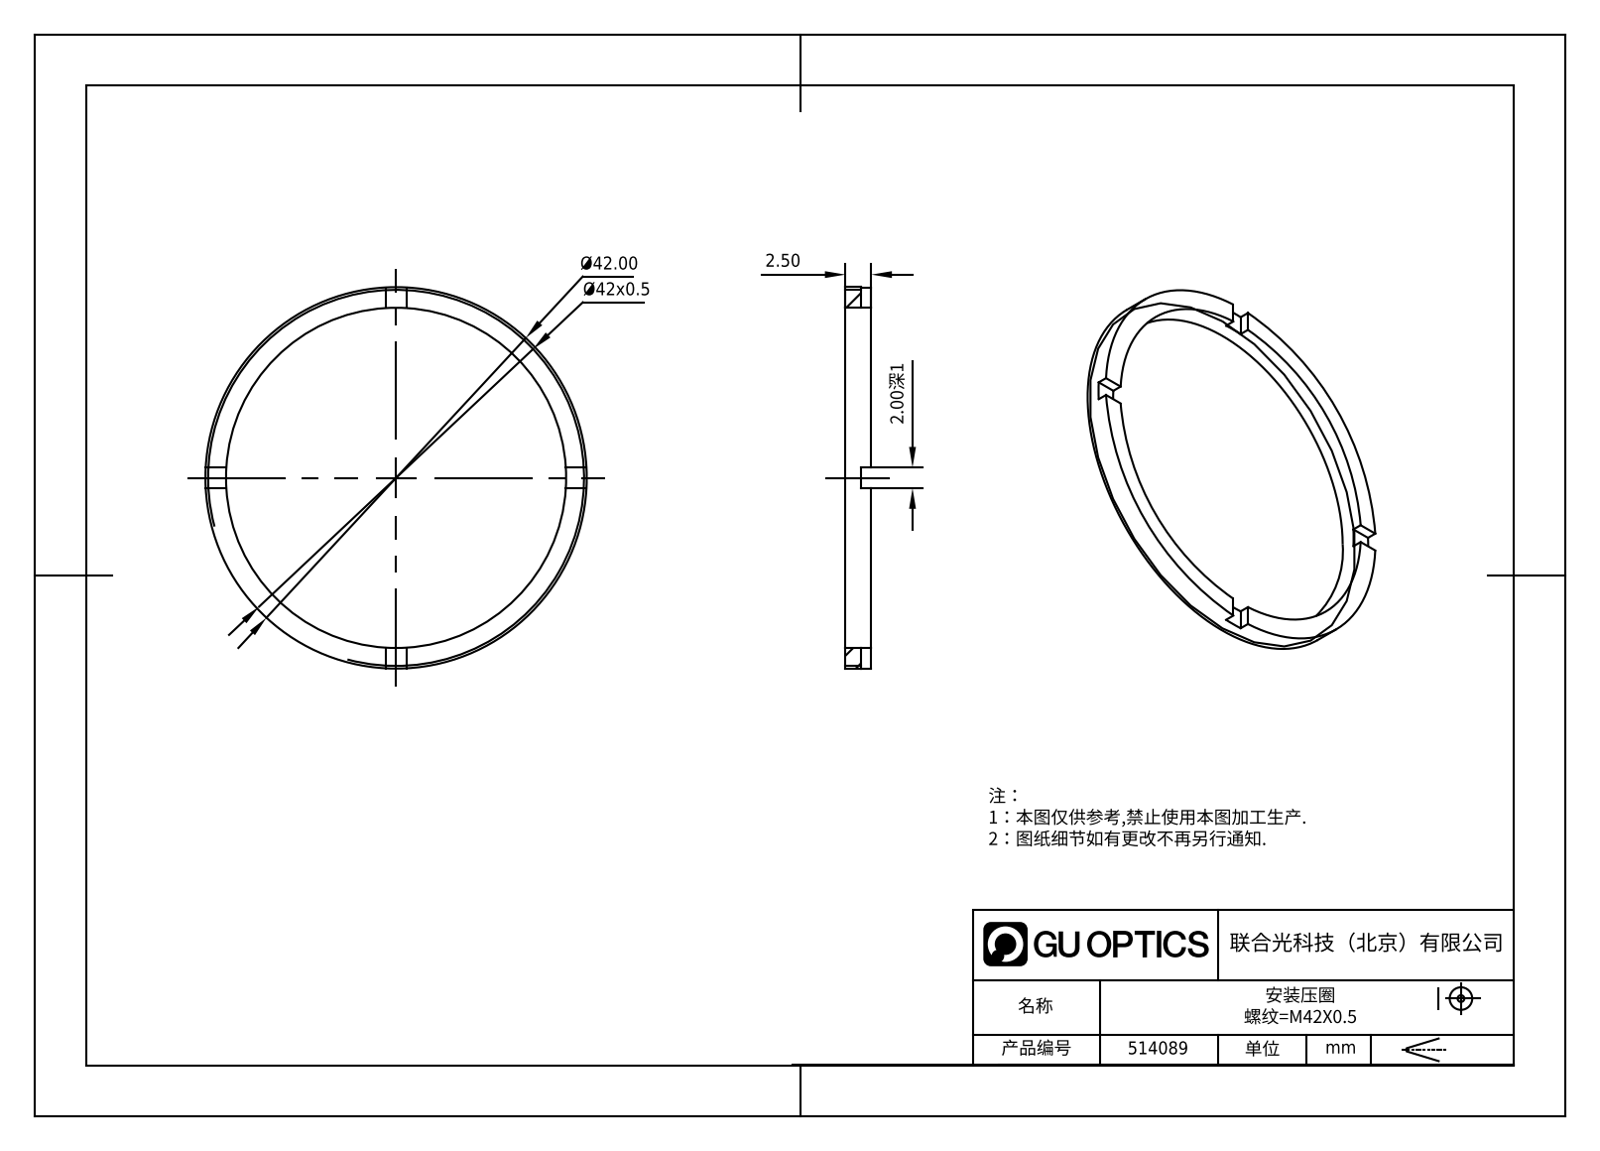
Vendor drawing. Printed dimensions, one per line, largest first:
Ø42.00
Ø42x0.5
2.50
2.00深1
